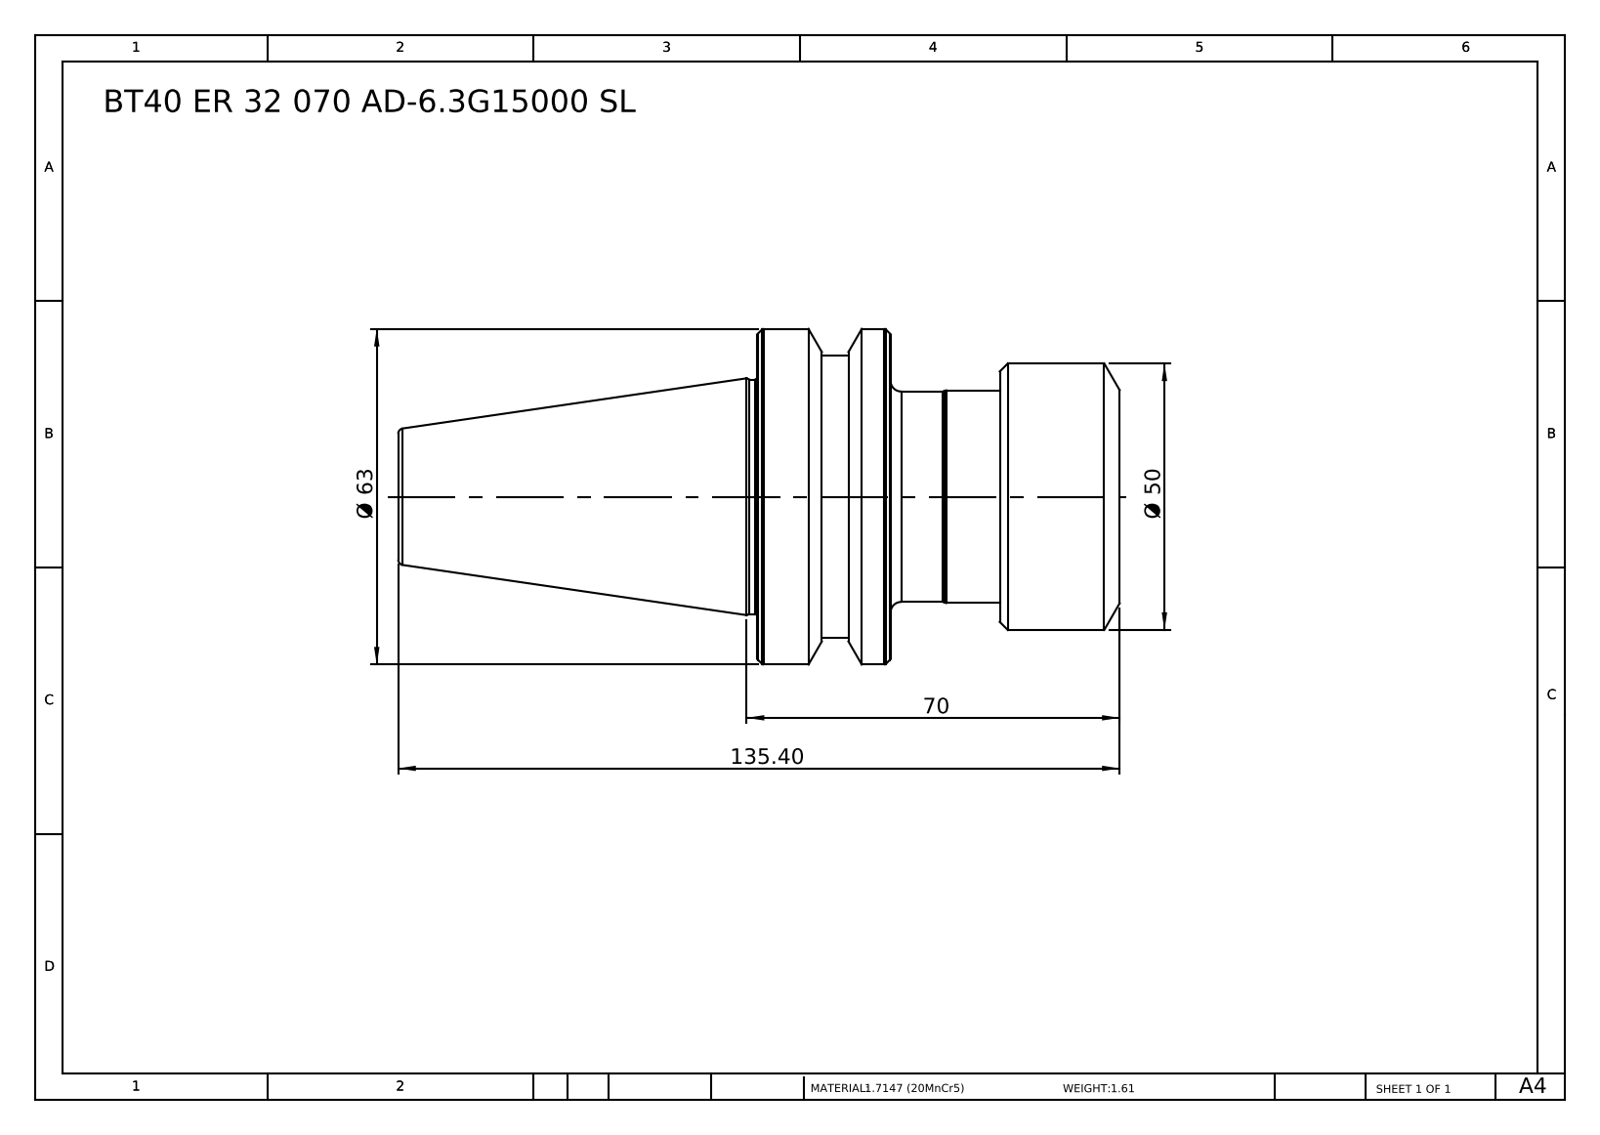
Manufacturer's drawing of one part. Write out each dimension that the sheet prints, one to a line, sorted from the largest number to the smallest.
135.40
70
Ø 63
Ø 50
